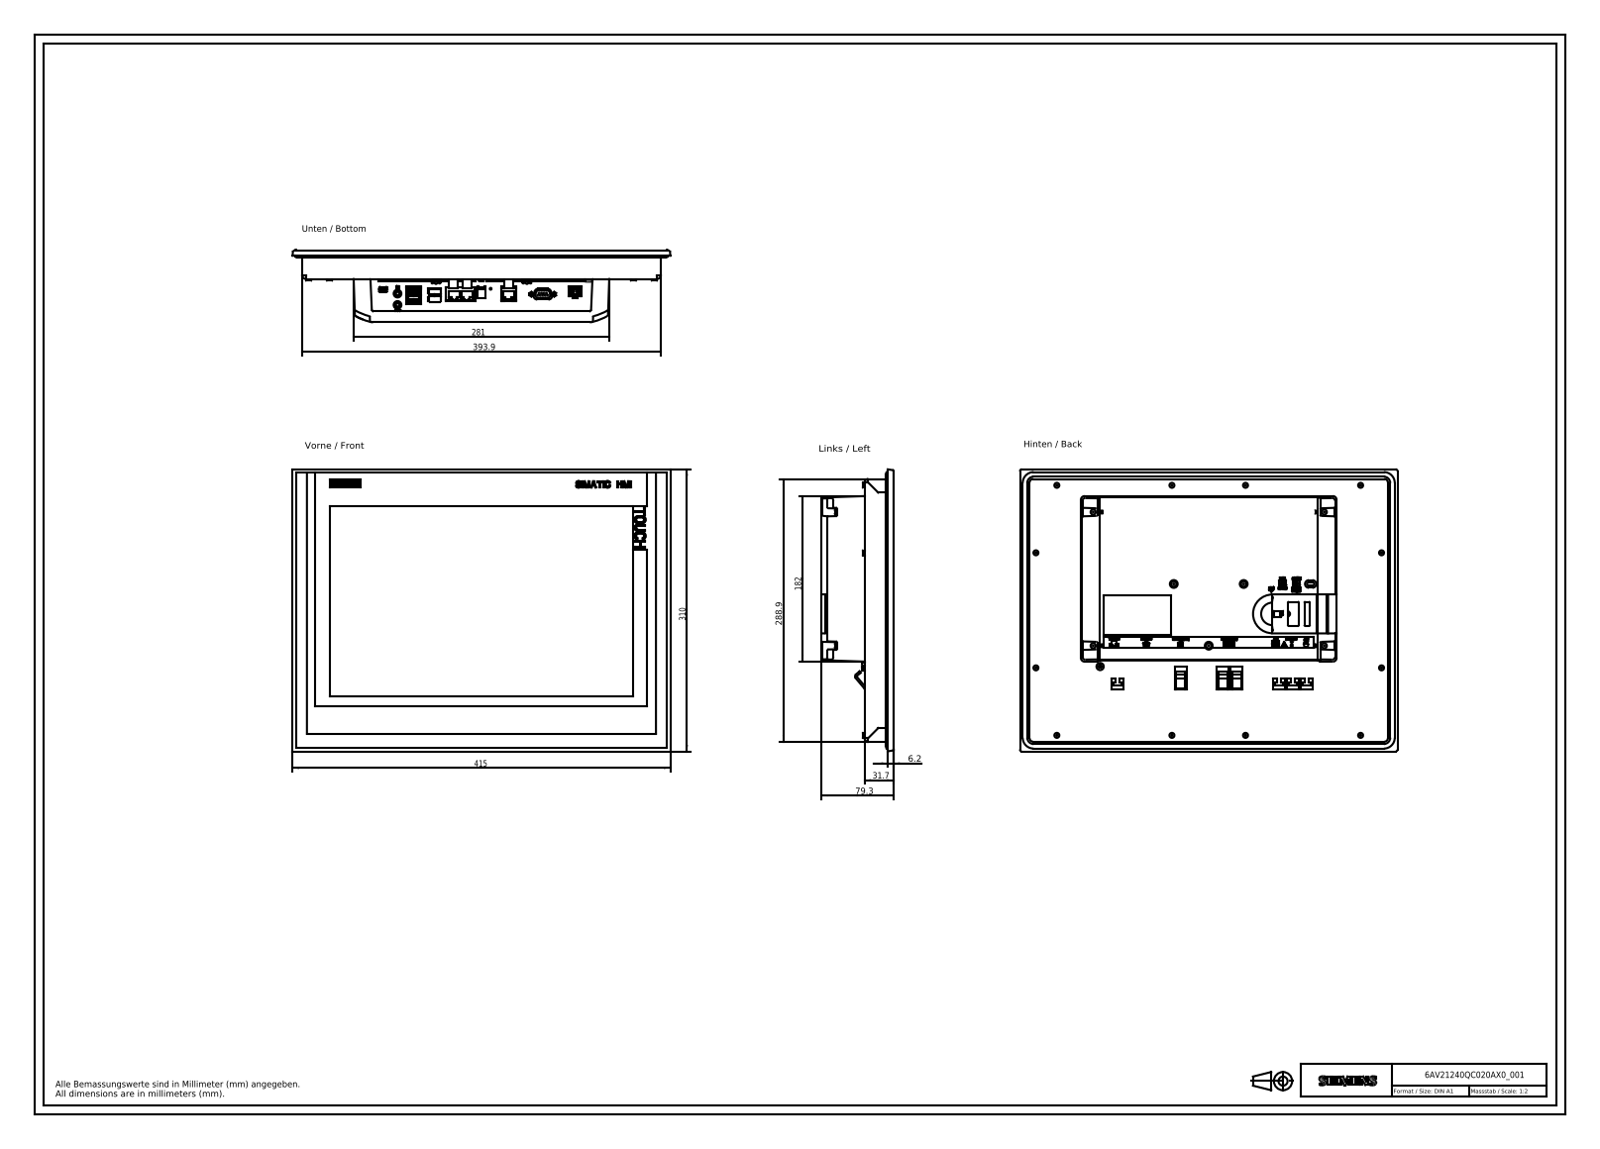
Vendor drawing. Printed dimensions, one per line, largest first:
415
393.9
310
288.9
281
182
79.3
31.7
6.2
